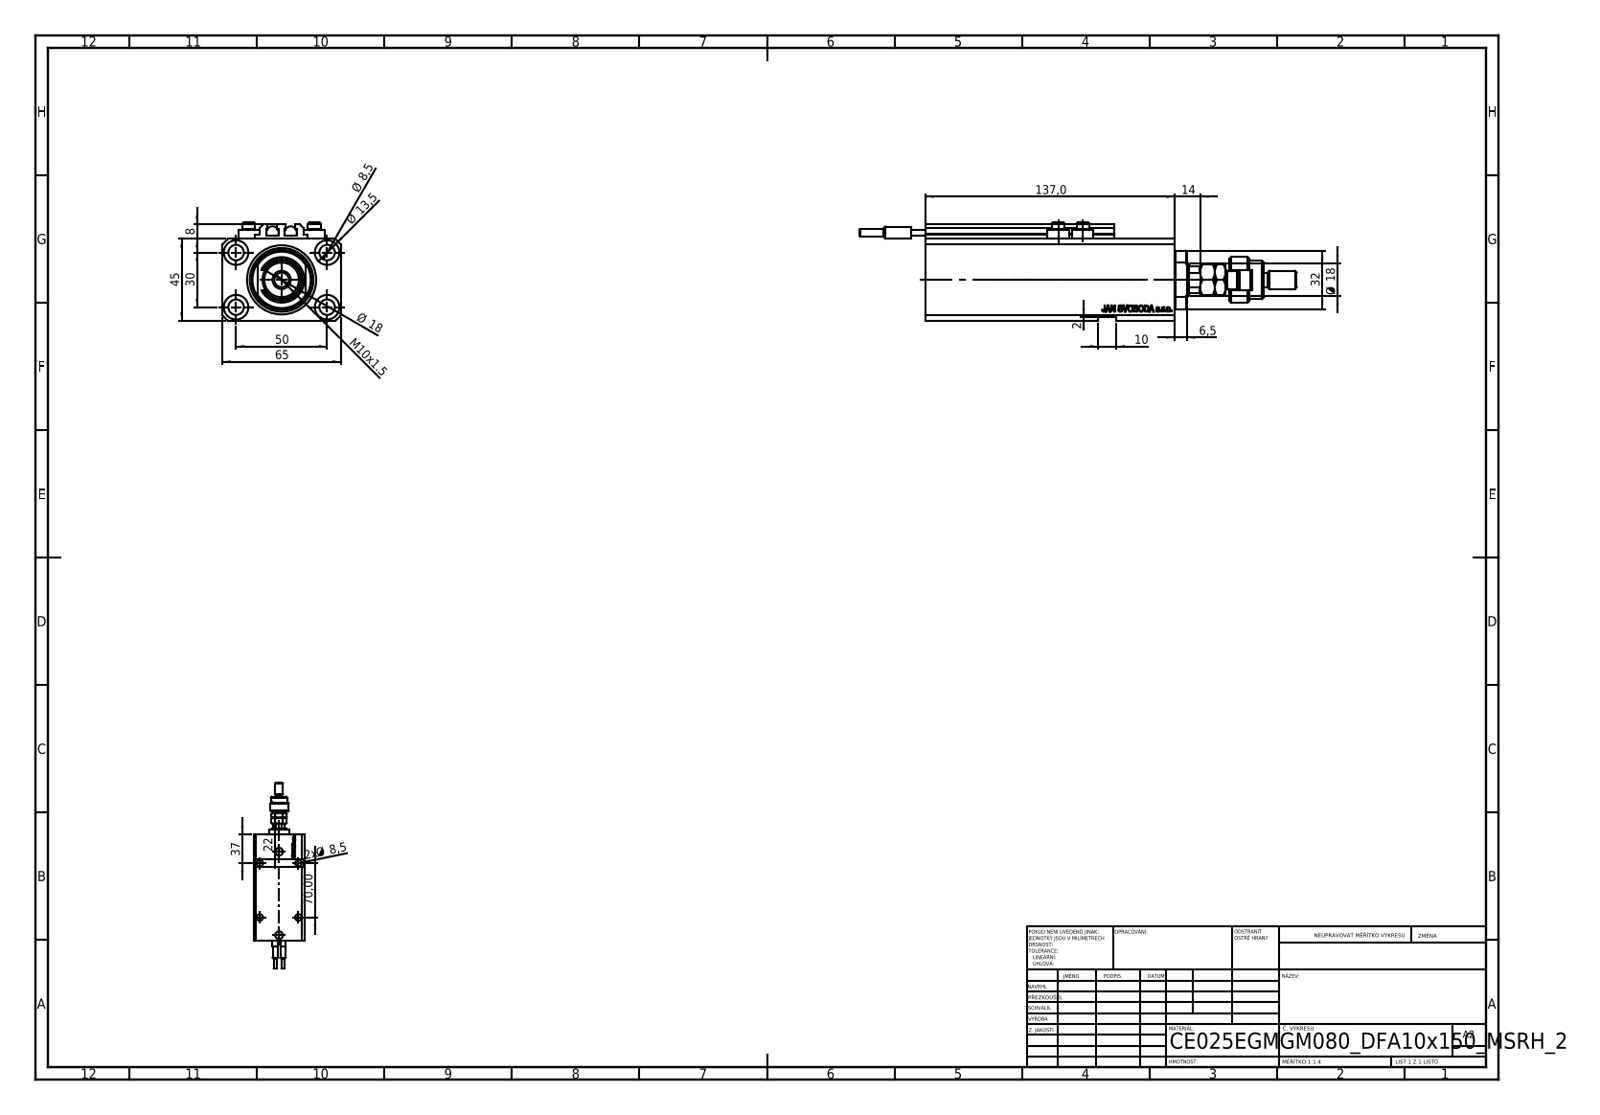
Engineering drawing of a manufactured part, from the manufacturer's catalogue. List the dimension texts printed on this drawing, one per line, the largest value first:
137,0
70,00
65
50
45
37
32
30
22
Ø 18
Ø 18
14
Ø 13,5
M10x1.5
10
Ø 8,5
2x Ø 8,5
8
6,5
2
